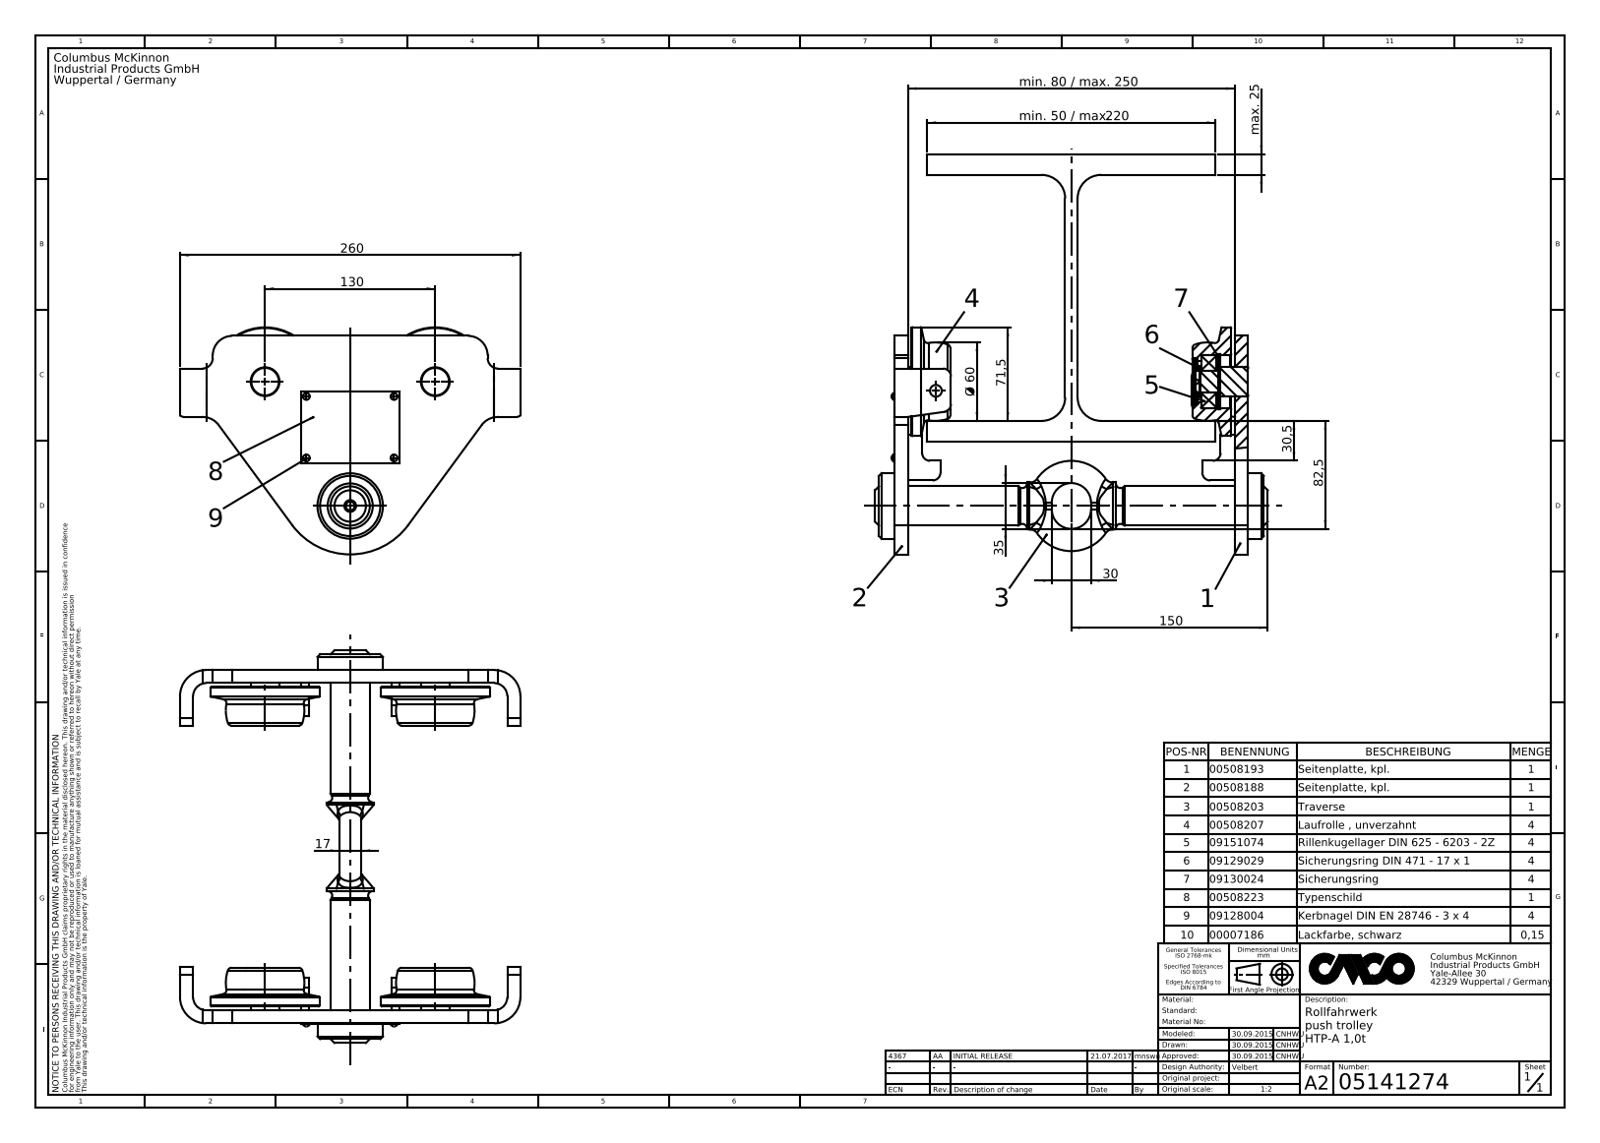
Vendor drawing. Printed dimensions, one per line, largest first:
260
150
130
82,5
min. 80 / max. 250
71,5
Ø 60
min. 50 / max. 220
35
30,5
30
max. 25
17
